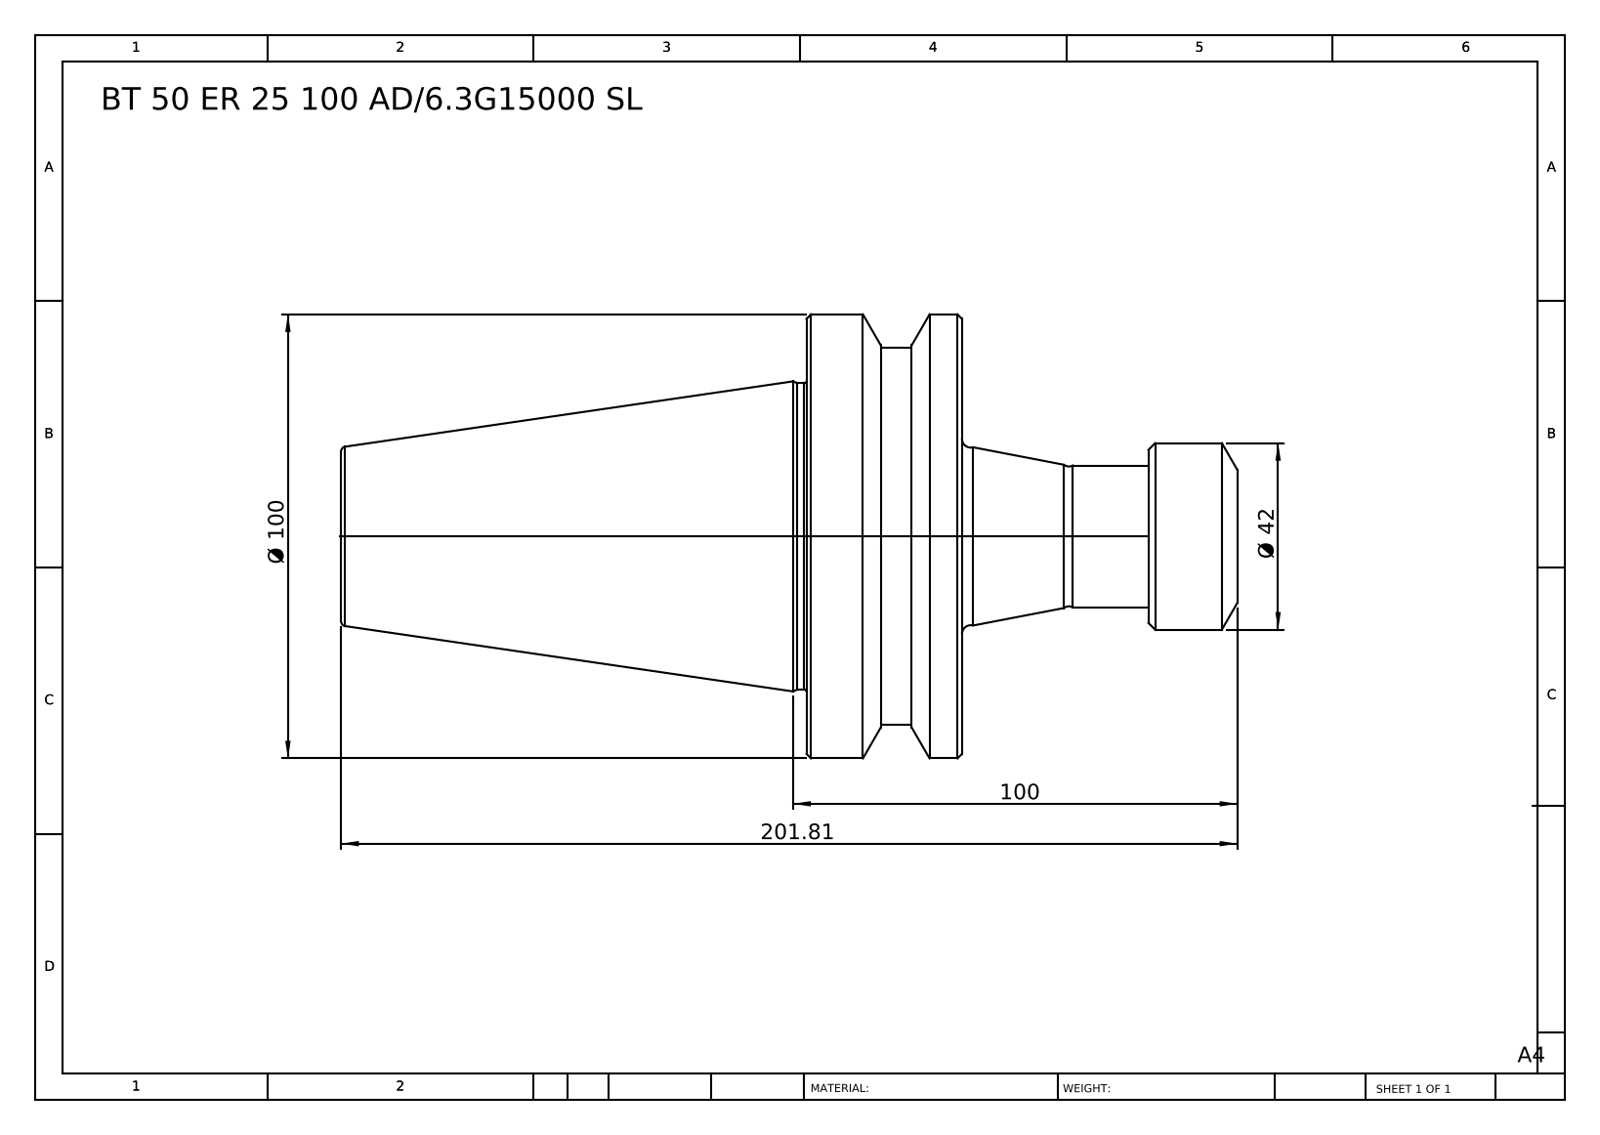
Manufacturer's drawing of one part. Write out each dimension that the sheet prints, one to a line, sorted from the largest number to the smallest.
201.81
100
Ø 100
Ø 42
